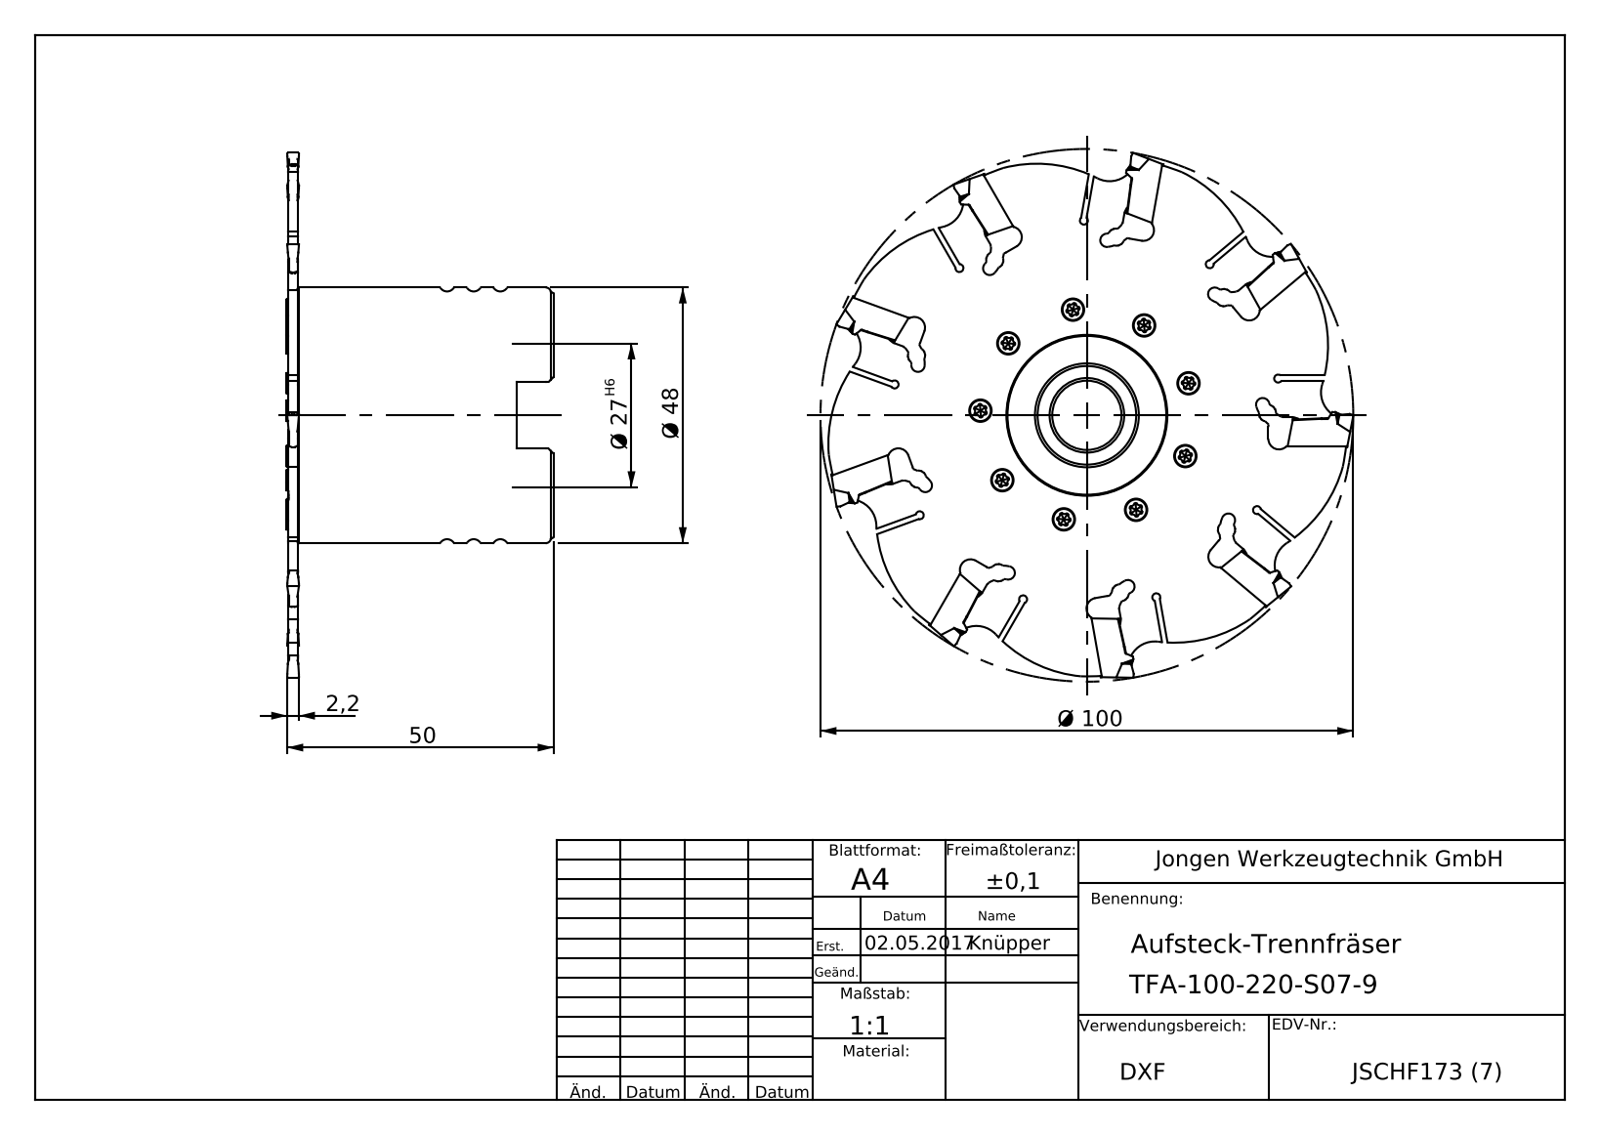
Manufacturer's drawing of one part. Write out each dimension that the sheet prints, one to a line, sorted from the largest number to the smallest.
Ø 100
50
Ø 48
Ø 27 H6
2,2
